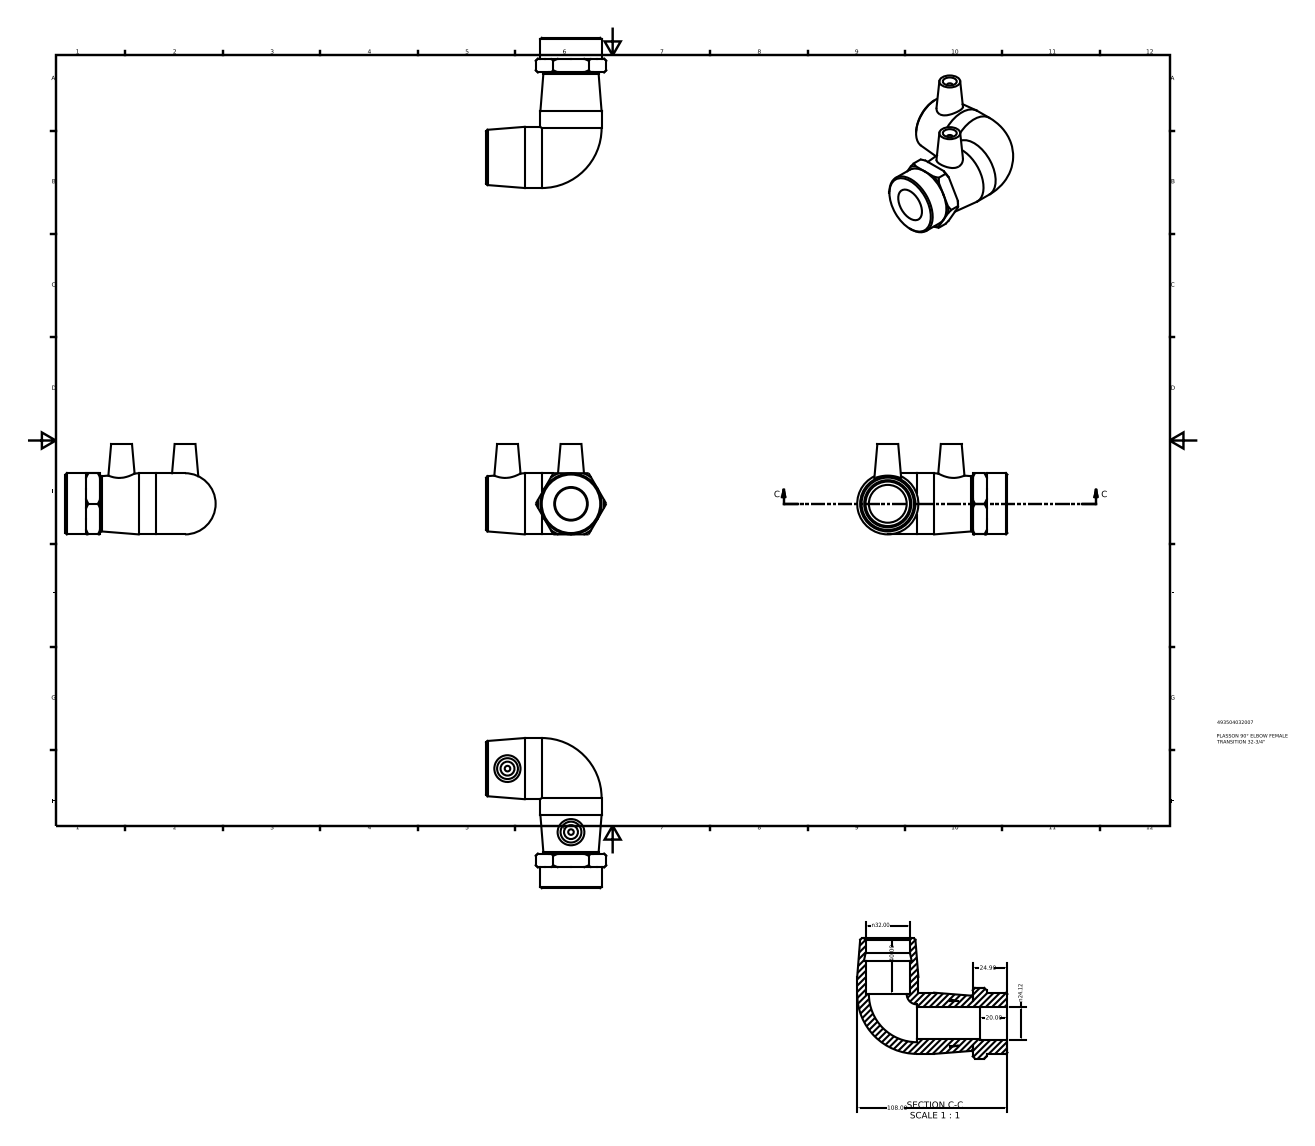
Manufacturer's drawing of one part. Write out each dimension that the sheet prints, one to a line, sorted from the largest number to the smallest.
108.00
40.00
n32.00
24.90
n24.12
20.00
